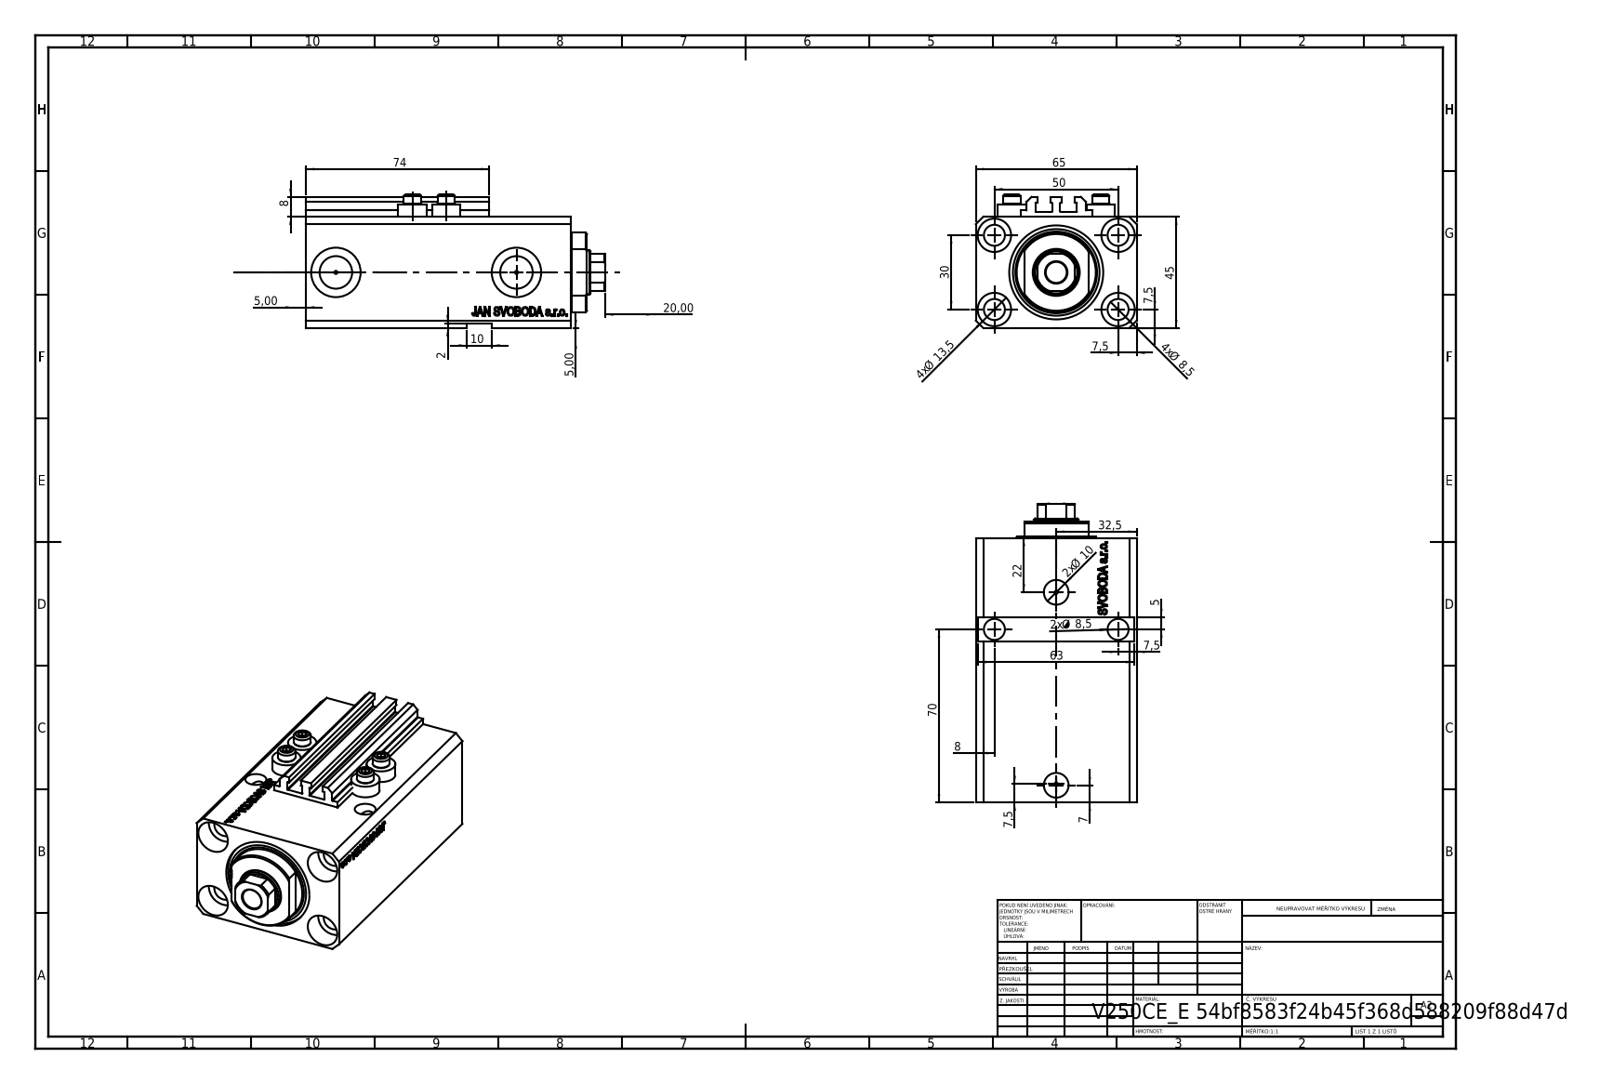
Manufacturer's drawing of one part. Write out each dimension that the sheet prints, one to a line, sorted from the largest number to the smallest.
74
70
65
63
50
45
32,5
30
22
20,00
4x Ø 13,5
10
2x Ø 10
4x Ø 8,5
2x Ø 8,5
8
8
7,5
7,5
7,5
7,5
7
5,00
5,00
5
2
